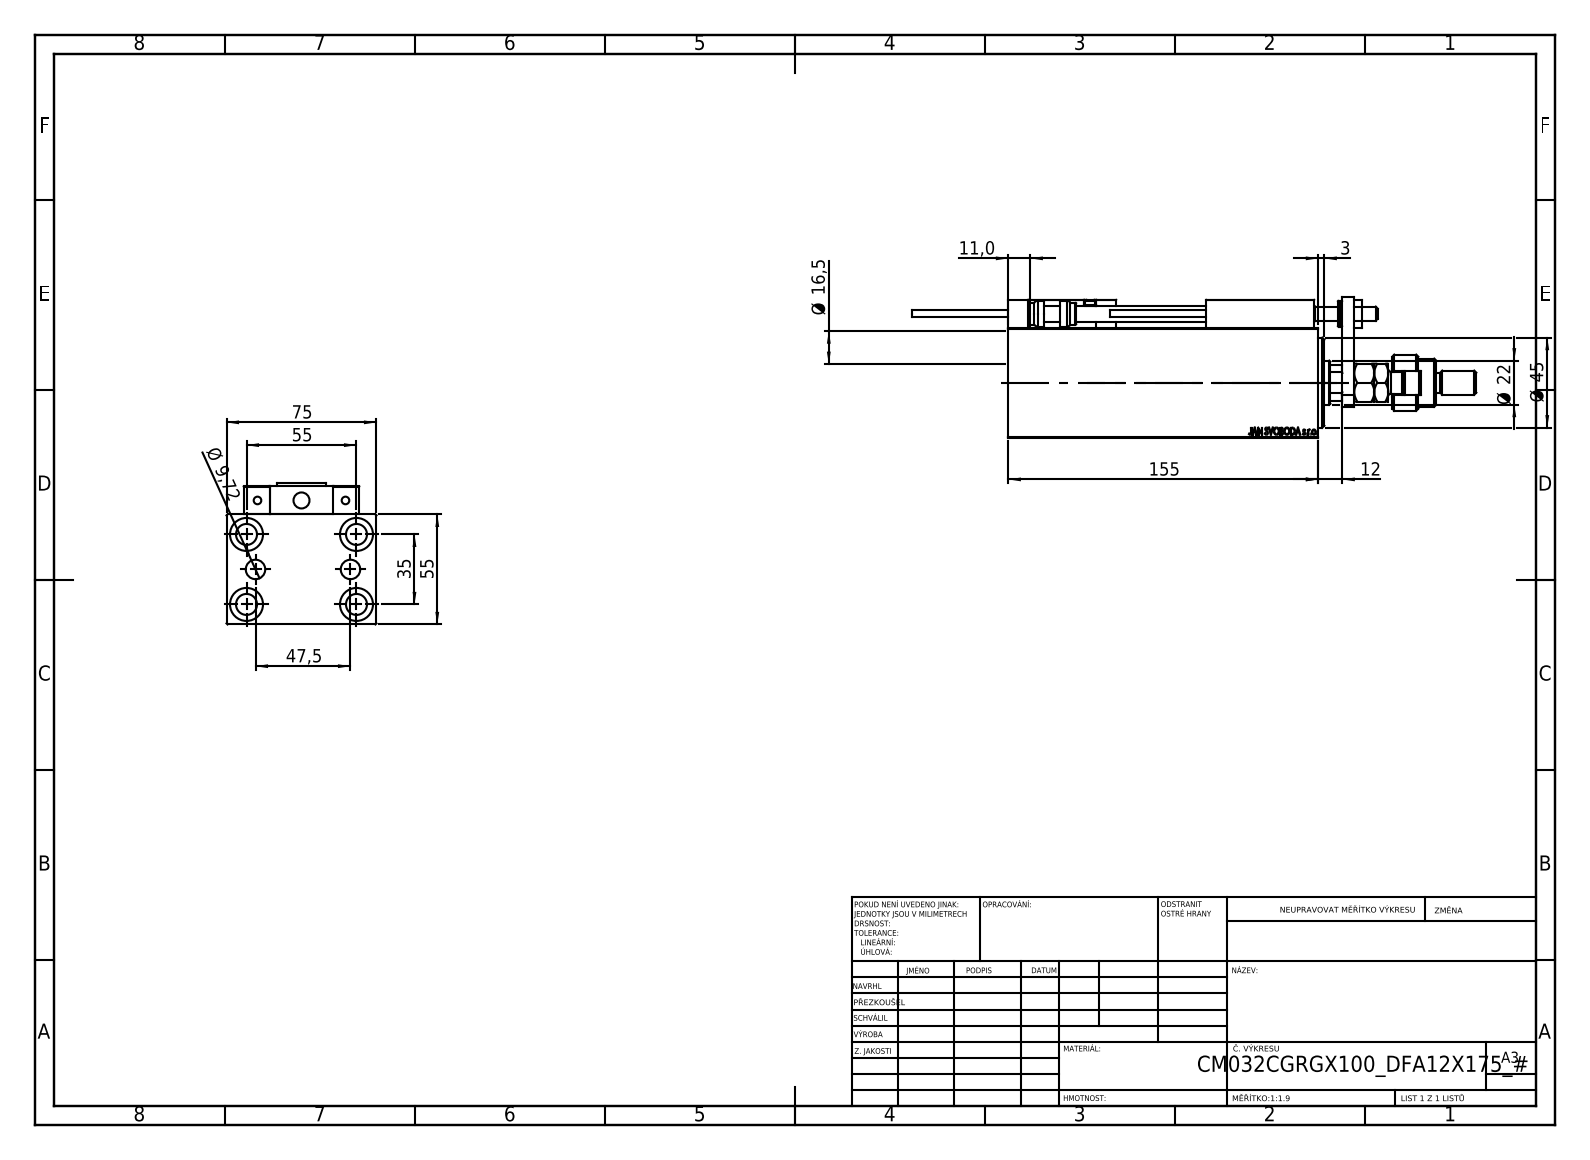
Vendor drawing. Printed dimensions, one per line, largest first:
155
75
55
55
47,5
Ø 45
35
Ø 22
Ø 16,5
12
11,0
Ø 9,72
3
